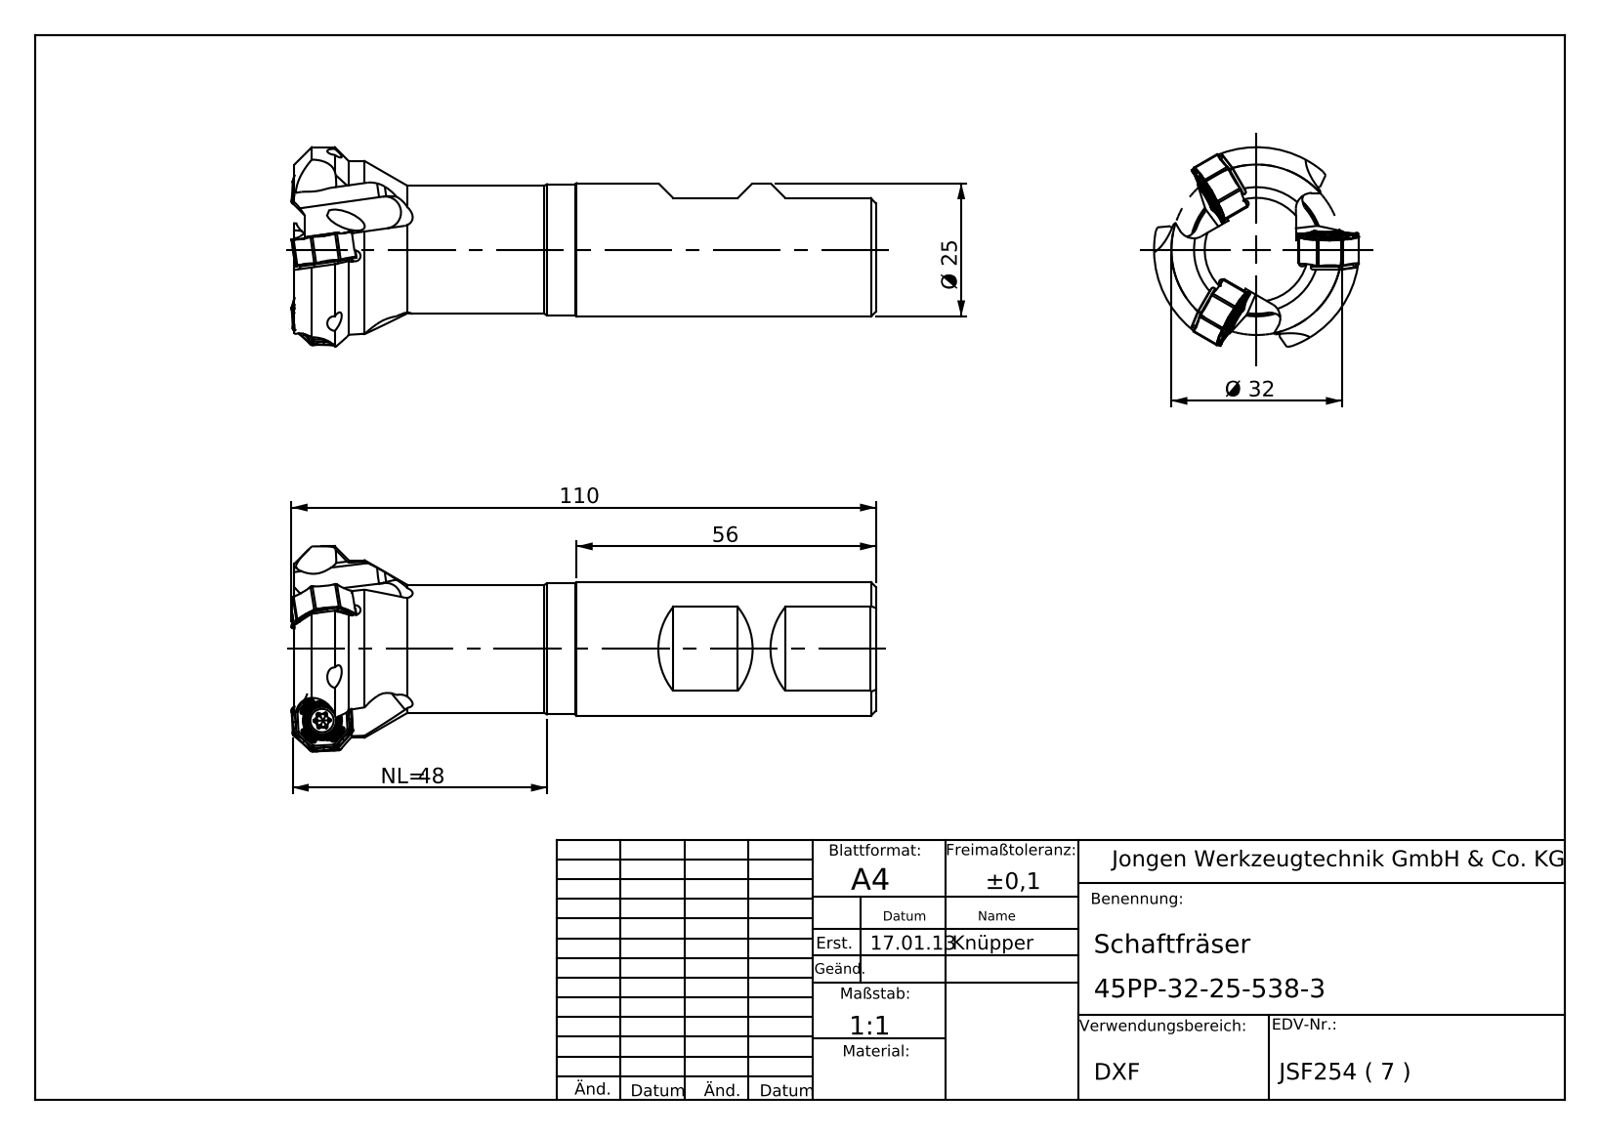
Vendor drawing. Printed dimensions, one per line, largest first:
110
56
NL= 48
Ø 32
Ø 25
